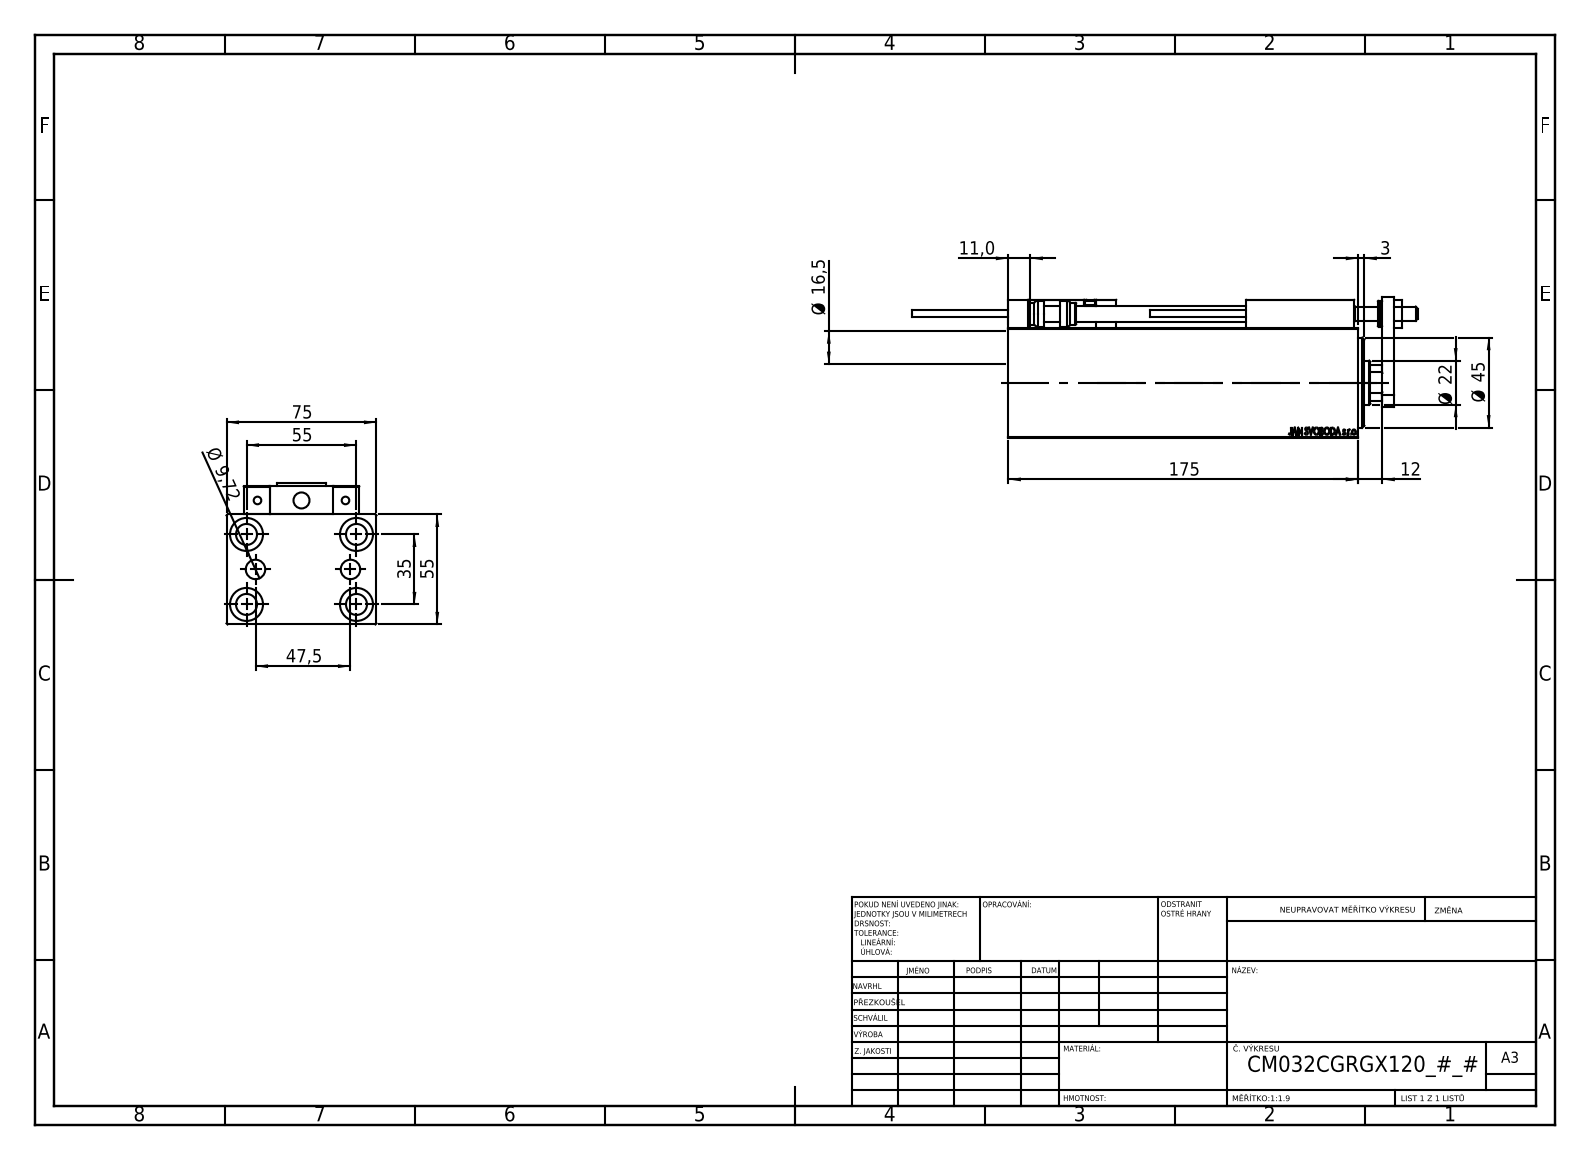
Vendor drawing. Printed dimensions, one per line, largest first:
175
75
55
55
47,5
Ø 45
35
Ø 22
Ø 16,5
12
11,0
Ø 9,72
3
